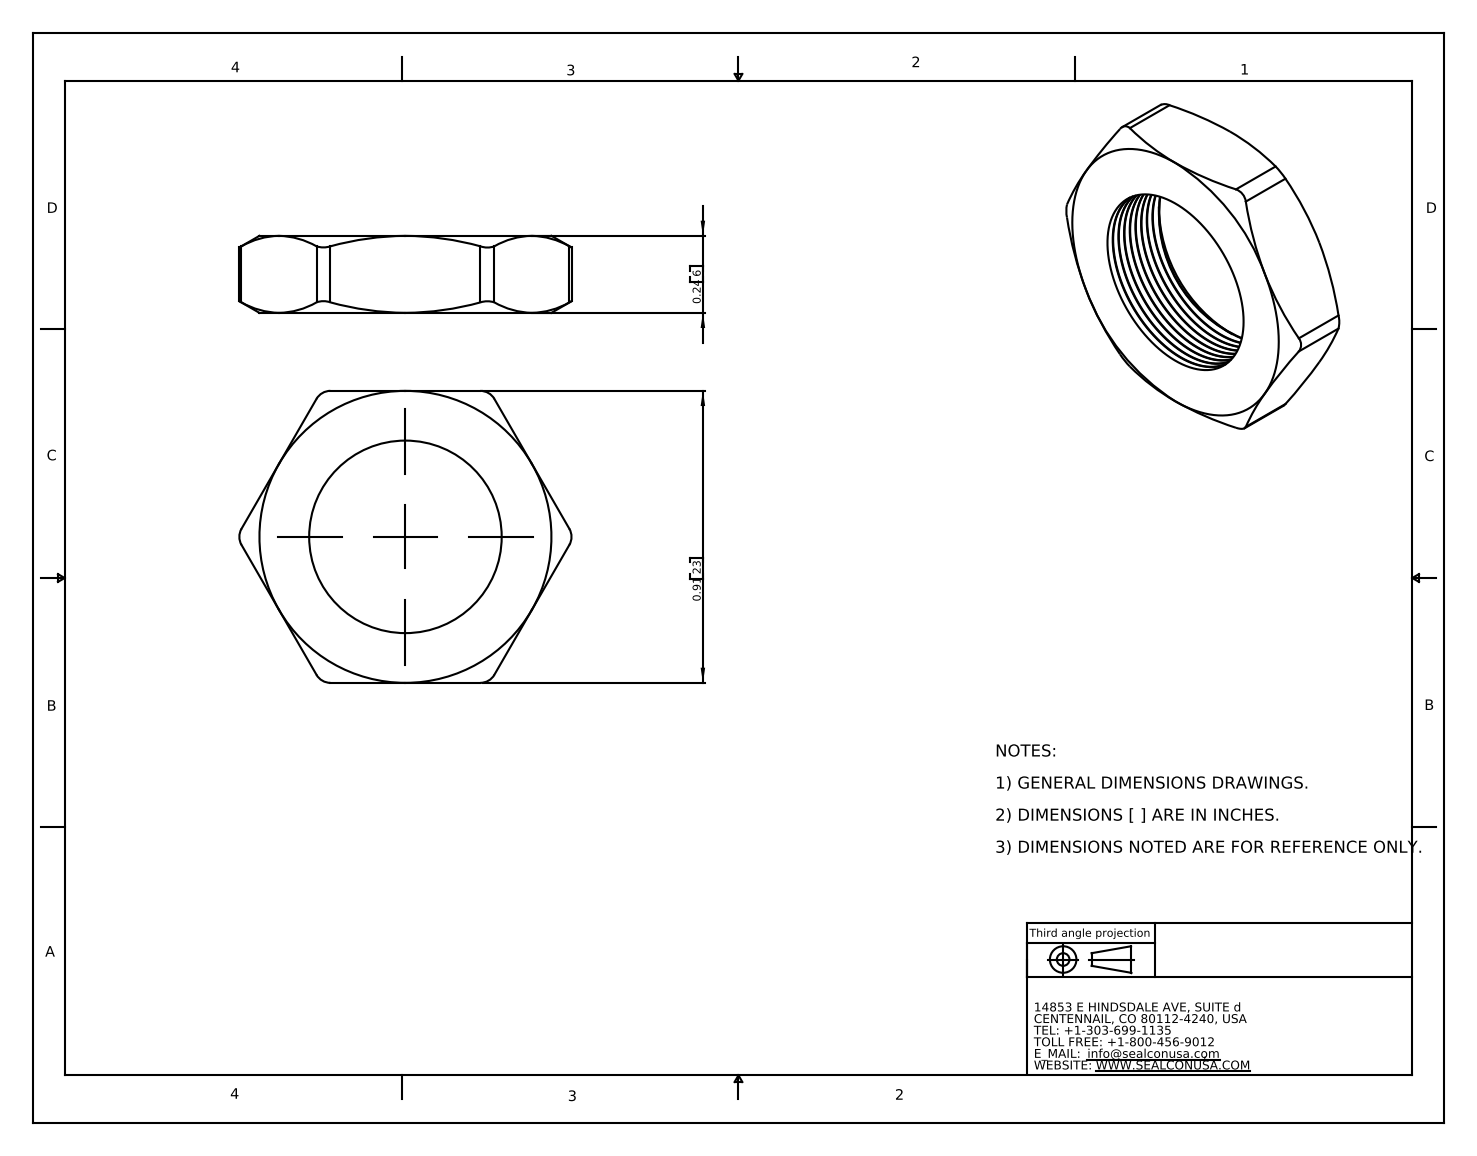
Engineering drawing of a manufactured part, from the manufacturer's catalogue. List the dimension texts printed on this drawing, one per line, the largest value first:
0.91 23
0.24 6
